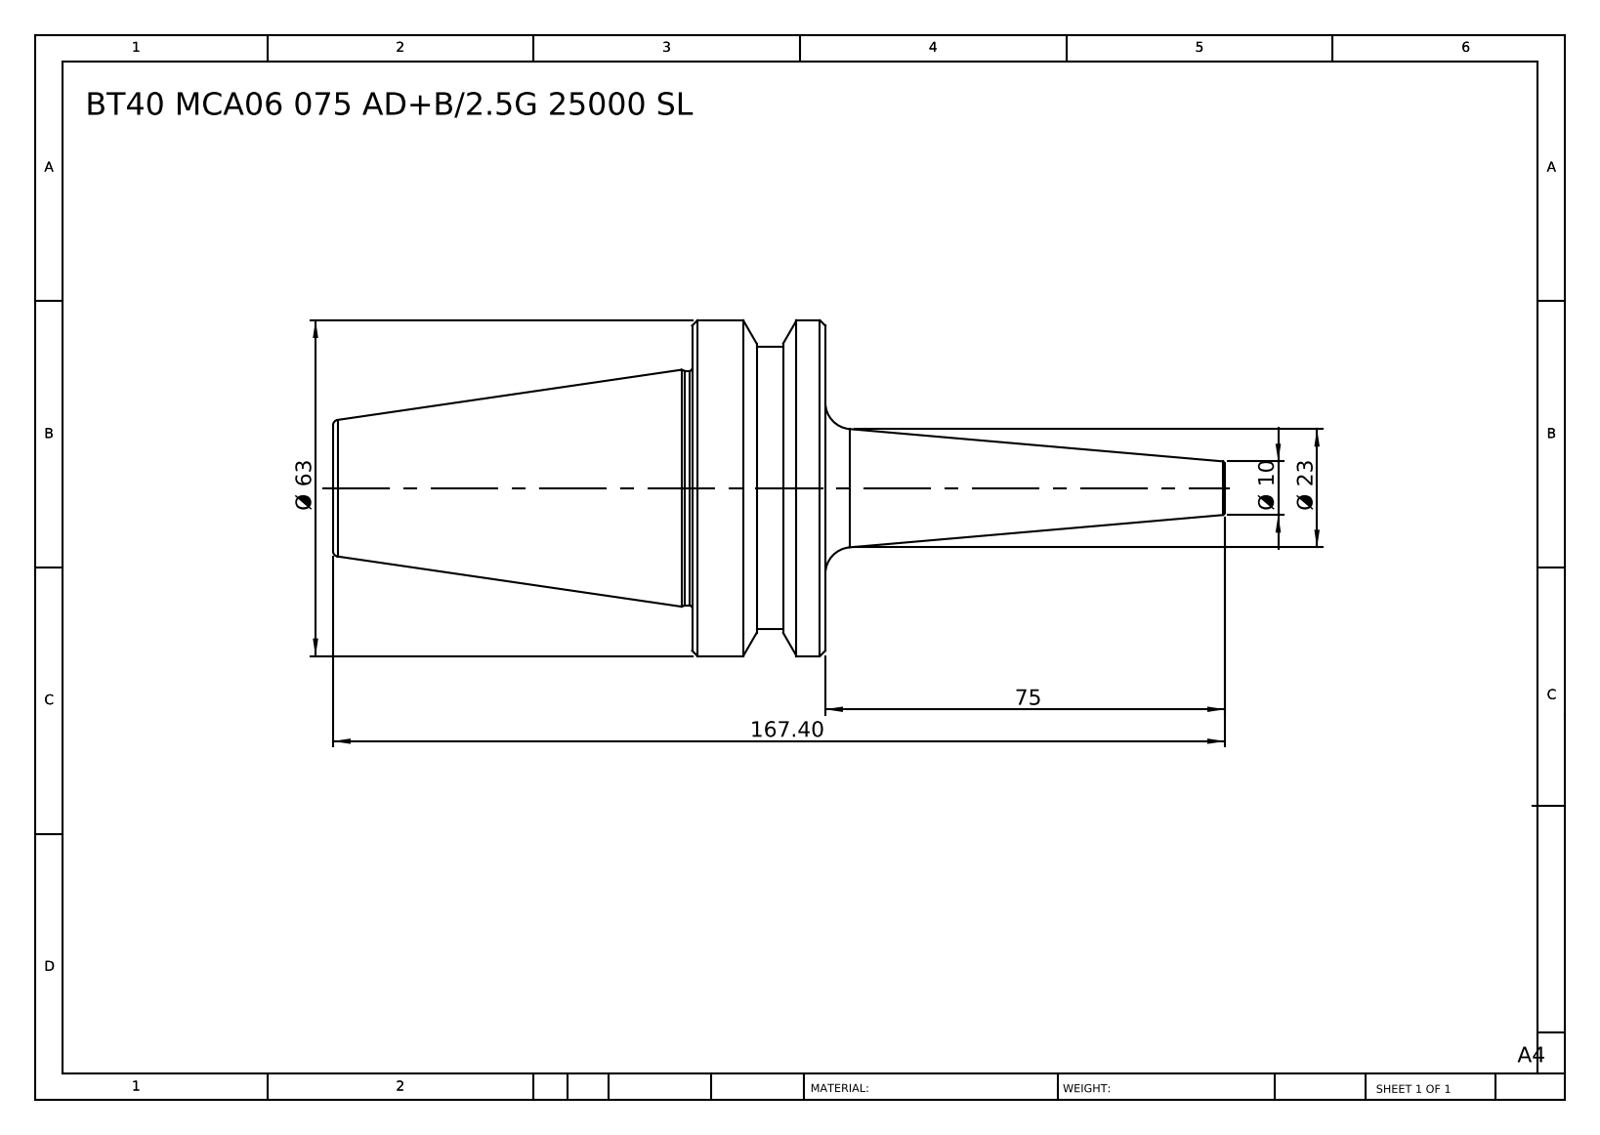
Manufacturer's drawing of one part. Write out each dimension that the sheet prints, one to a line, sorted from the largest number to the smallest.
167.40
75
Ø 63
Ø 23
Ø 10
